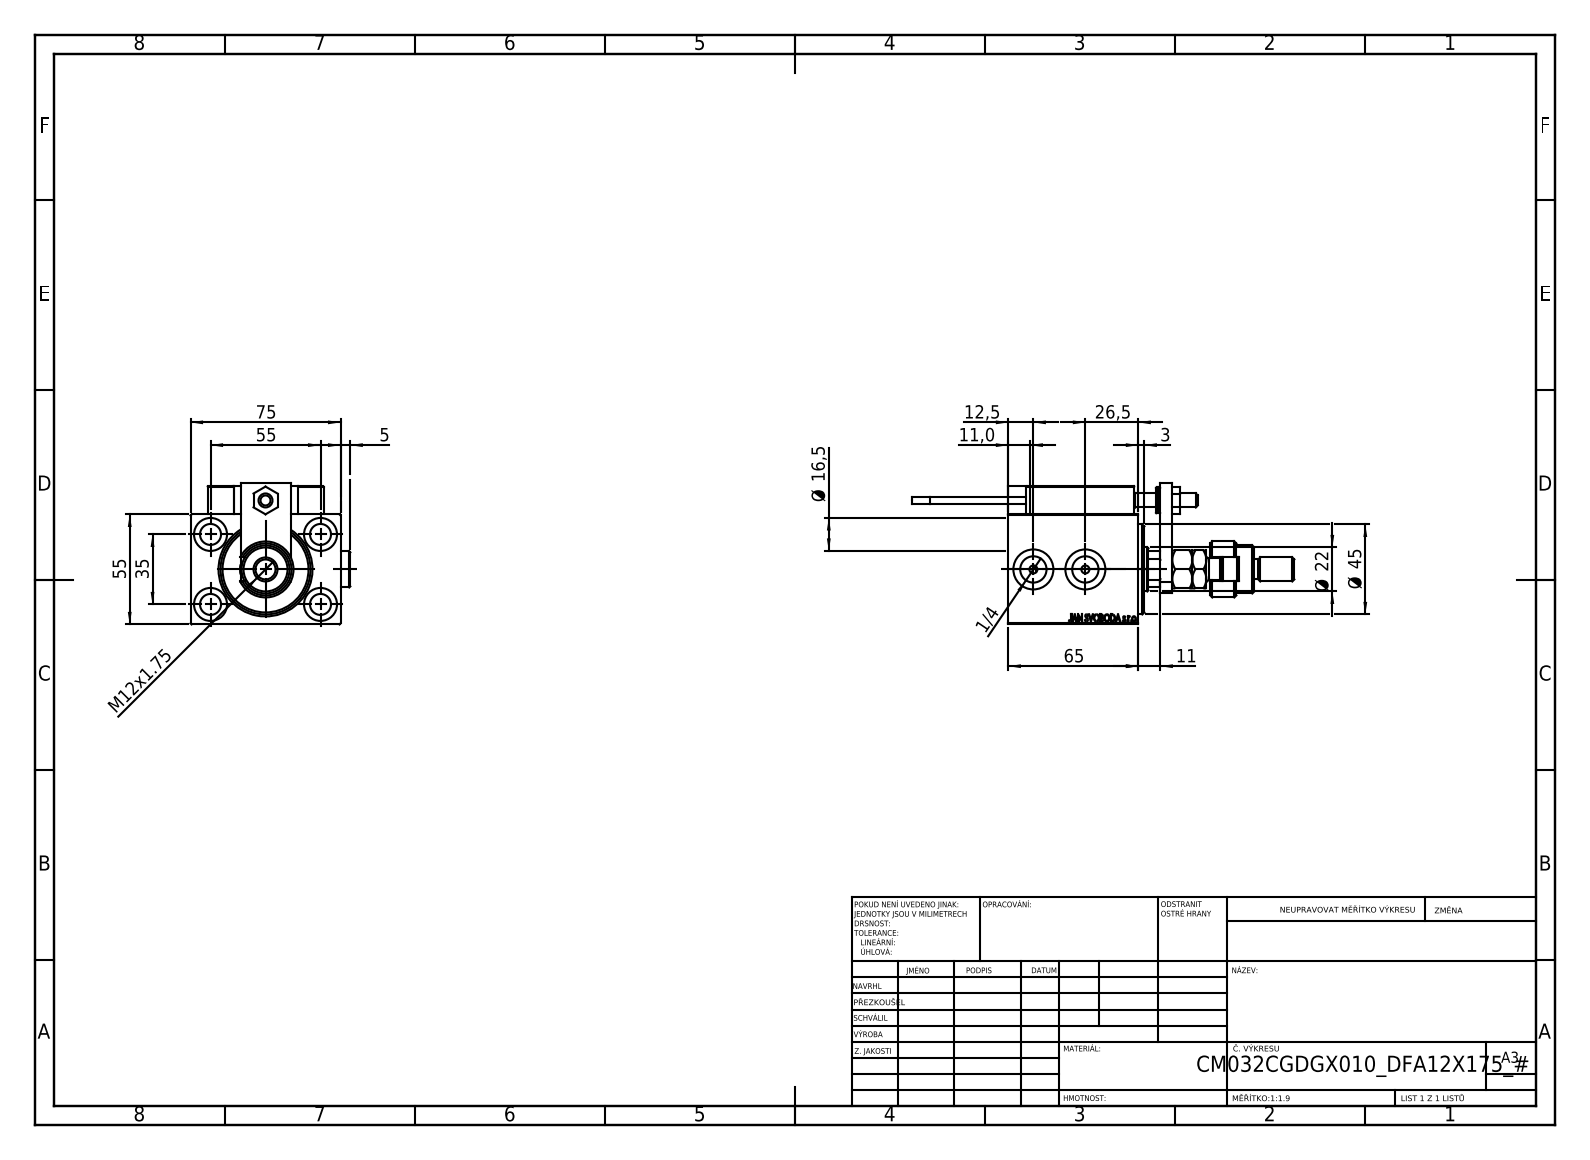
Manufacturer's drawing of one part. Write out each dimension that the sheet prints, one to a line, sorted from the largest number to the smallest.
75
65
55
55
Ø 45
35
26,5
Ø 22
Ø 16,5
12,5
M12x1.75
11
11,0
5
3
1/4
